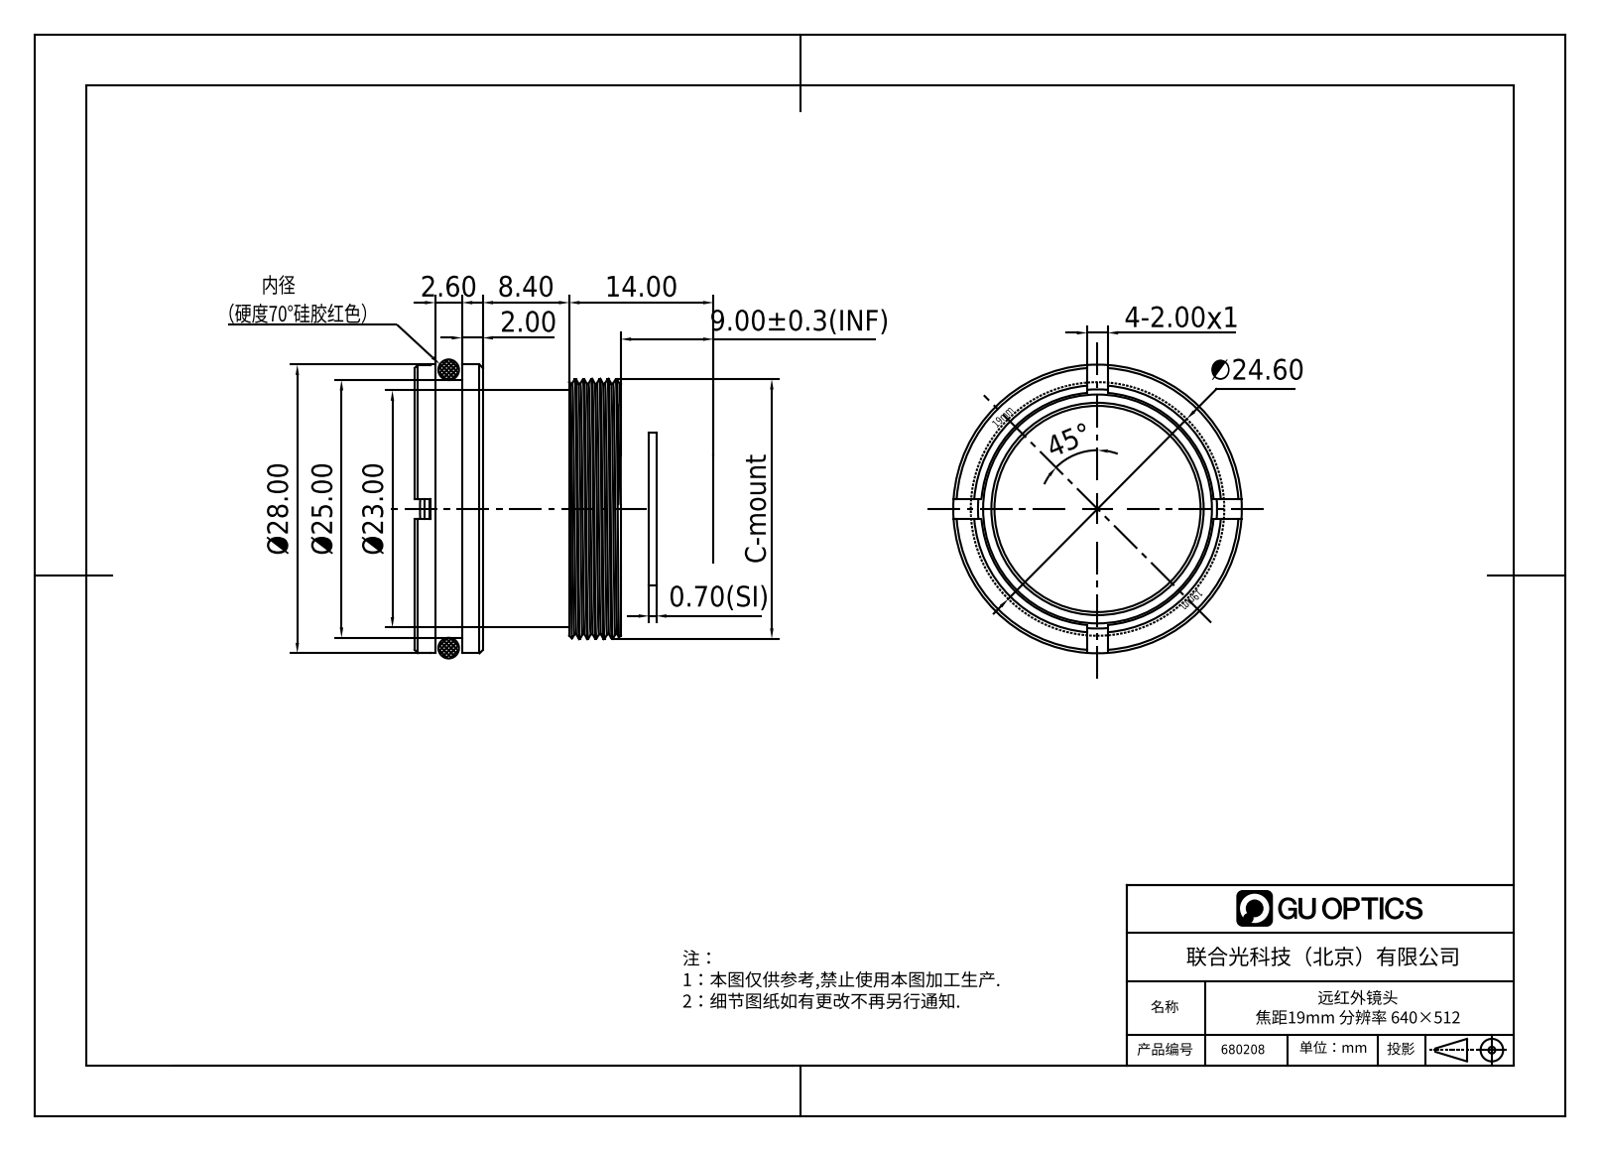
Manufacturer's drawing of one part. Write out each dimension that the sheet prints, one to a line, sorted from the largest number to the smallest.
45°
Ø28.00
Ø25.00
∅24.60
Ø23.00
14.00
9.00±0.3(INF)
8.40
4-2.00x1
2.60
2.00
0.70(SI)
C-mount
